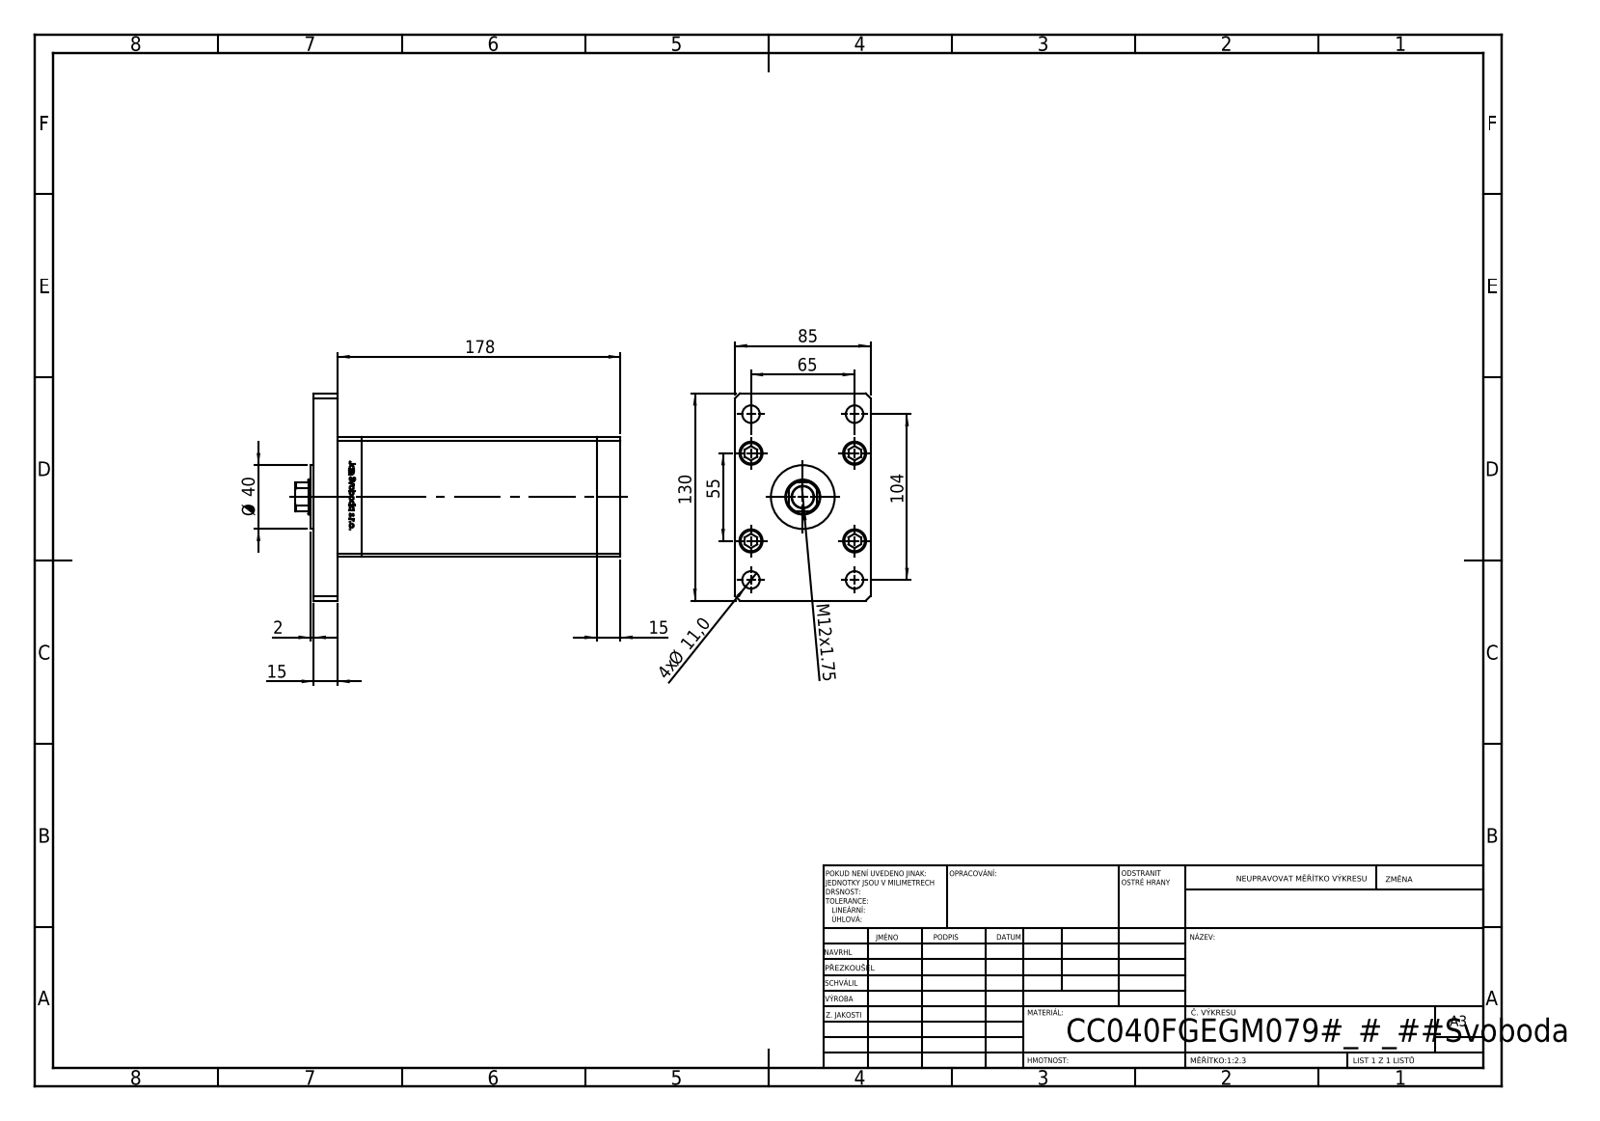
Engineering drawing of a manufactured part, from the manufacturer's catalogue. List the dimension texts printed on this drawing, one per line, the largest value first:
178
130
104
85
65
55
Ø 40
15
15
M12x1.75
4x Ø 11,0
2
